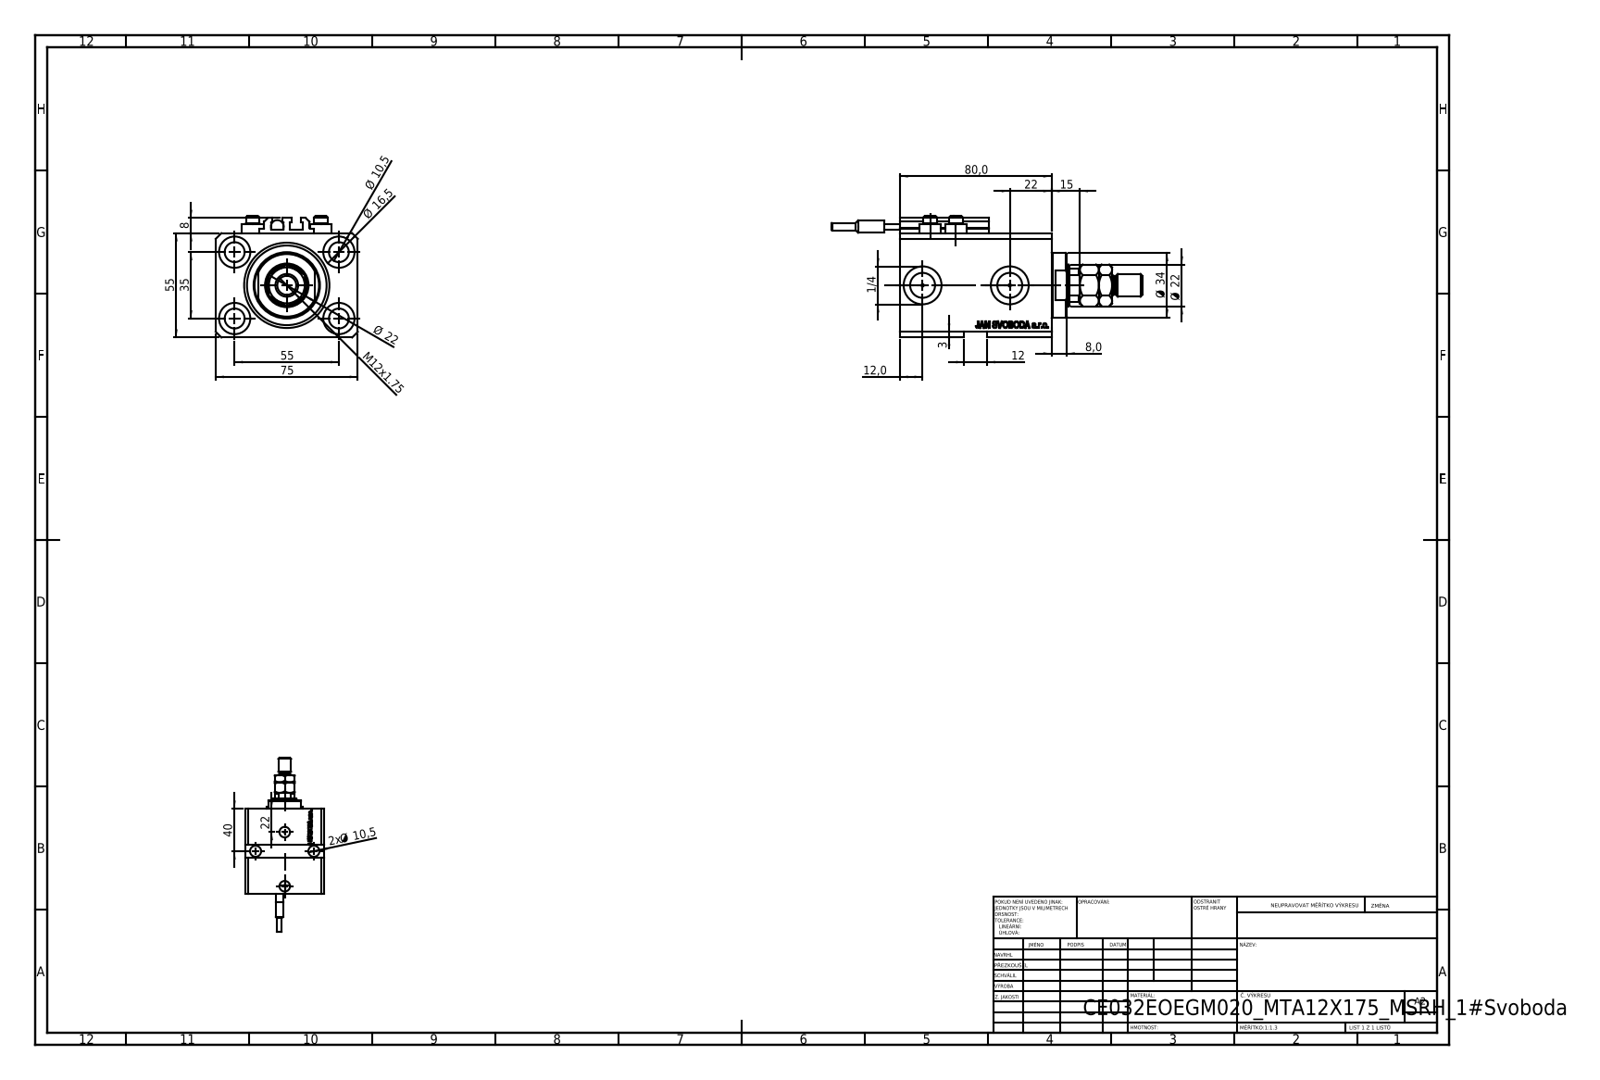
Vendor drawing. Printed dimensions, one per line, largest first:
80,0
75
55
55
40
35
Ø 34
Ø 22
22
Ø 22
22
Ø 16,5
15
M12x1.75
12,0
12
Ø 10,5
2x Ø 10,5
8
8,0
3
1/4
